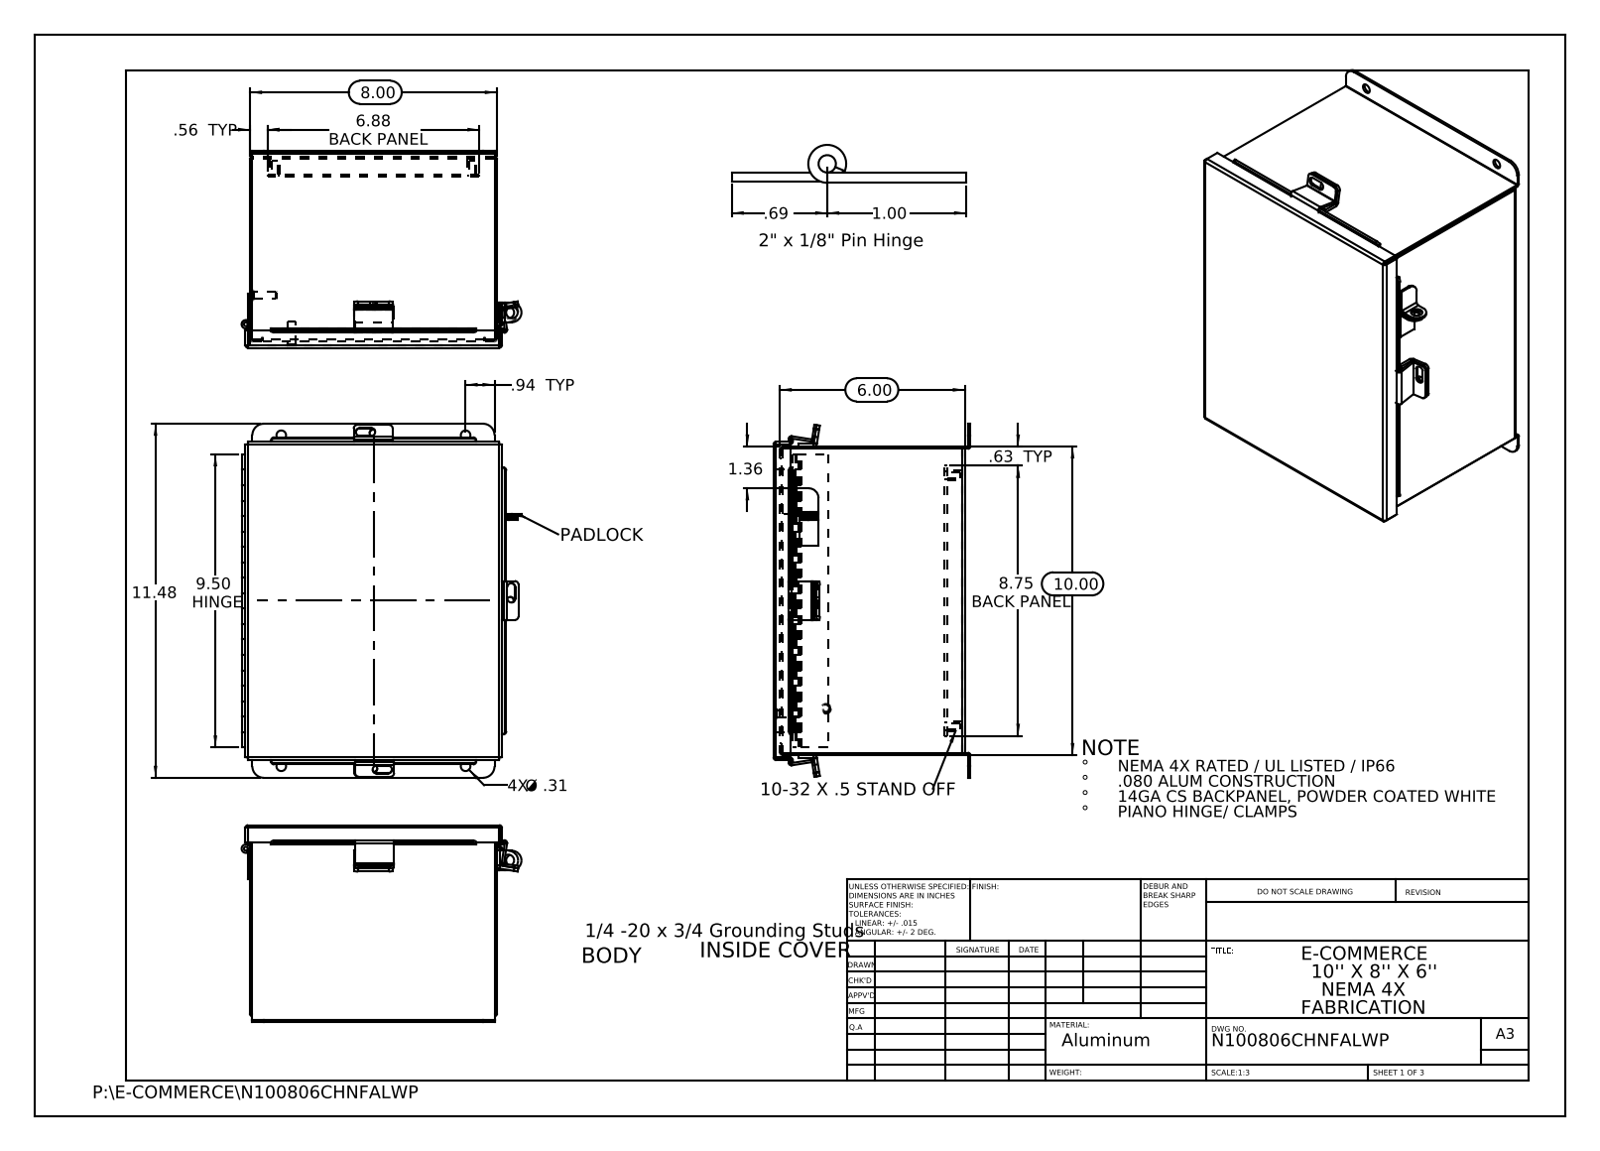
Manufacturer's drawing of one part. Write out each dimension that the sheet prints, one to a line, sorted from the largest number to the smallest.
11.48
10.00
9.50 HINGE
8.75 BACK PANEL
8.00
6.88 BACK PANEL
6.00
1.36
1.00
.94 TYP
.69
.63 TYP
.56 TYP
4X Ø .31
